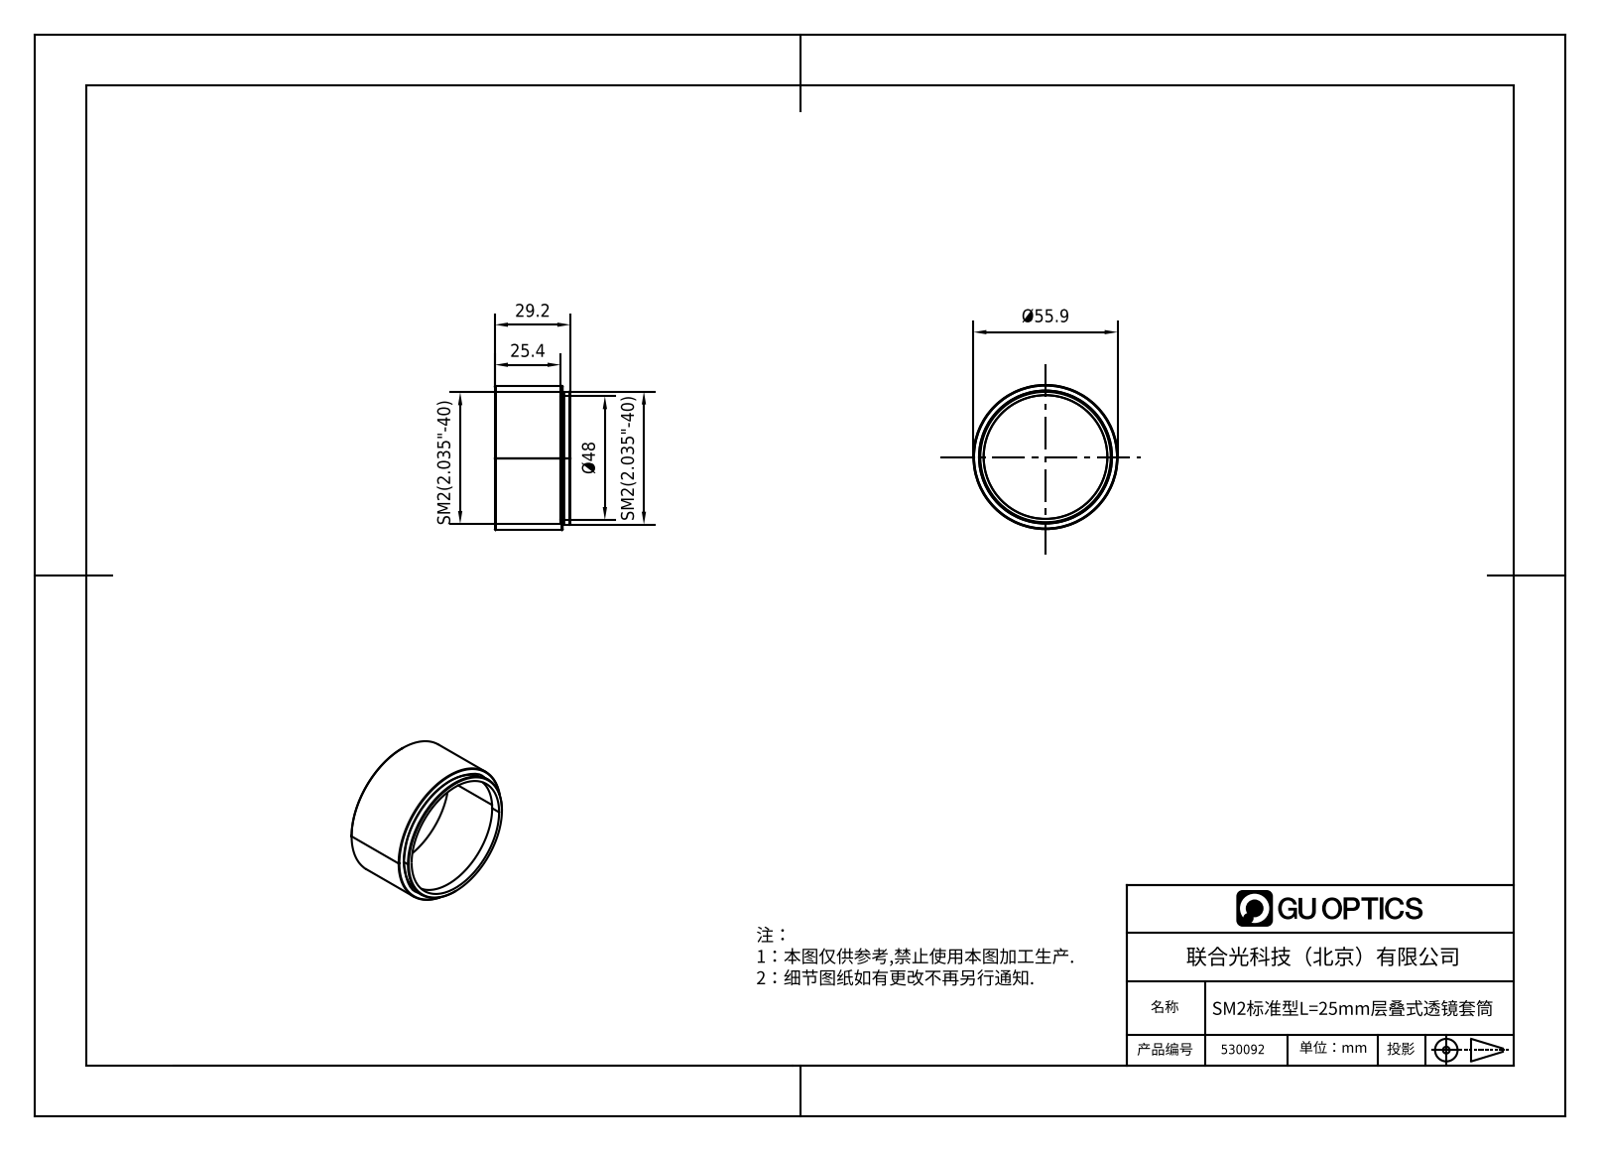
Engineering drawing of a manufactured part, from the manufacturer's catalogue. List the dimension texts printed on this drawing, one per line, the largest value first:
Ø55.9
Ø48
29.2
25.4
SM2(2.035"-40)
SM2(2.035"-40)
